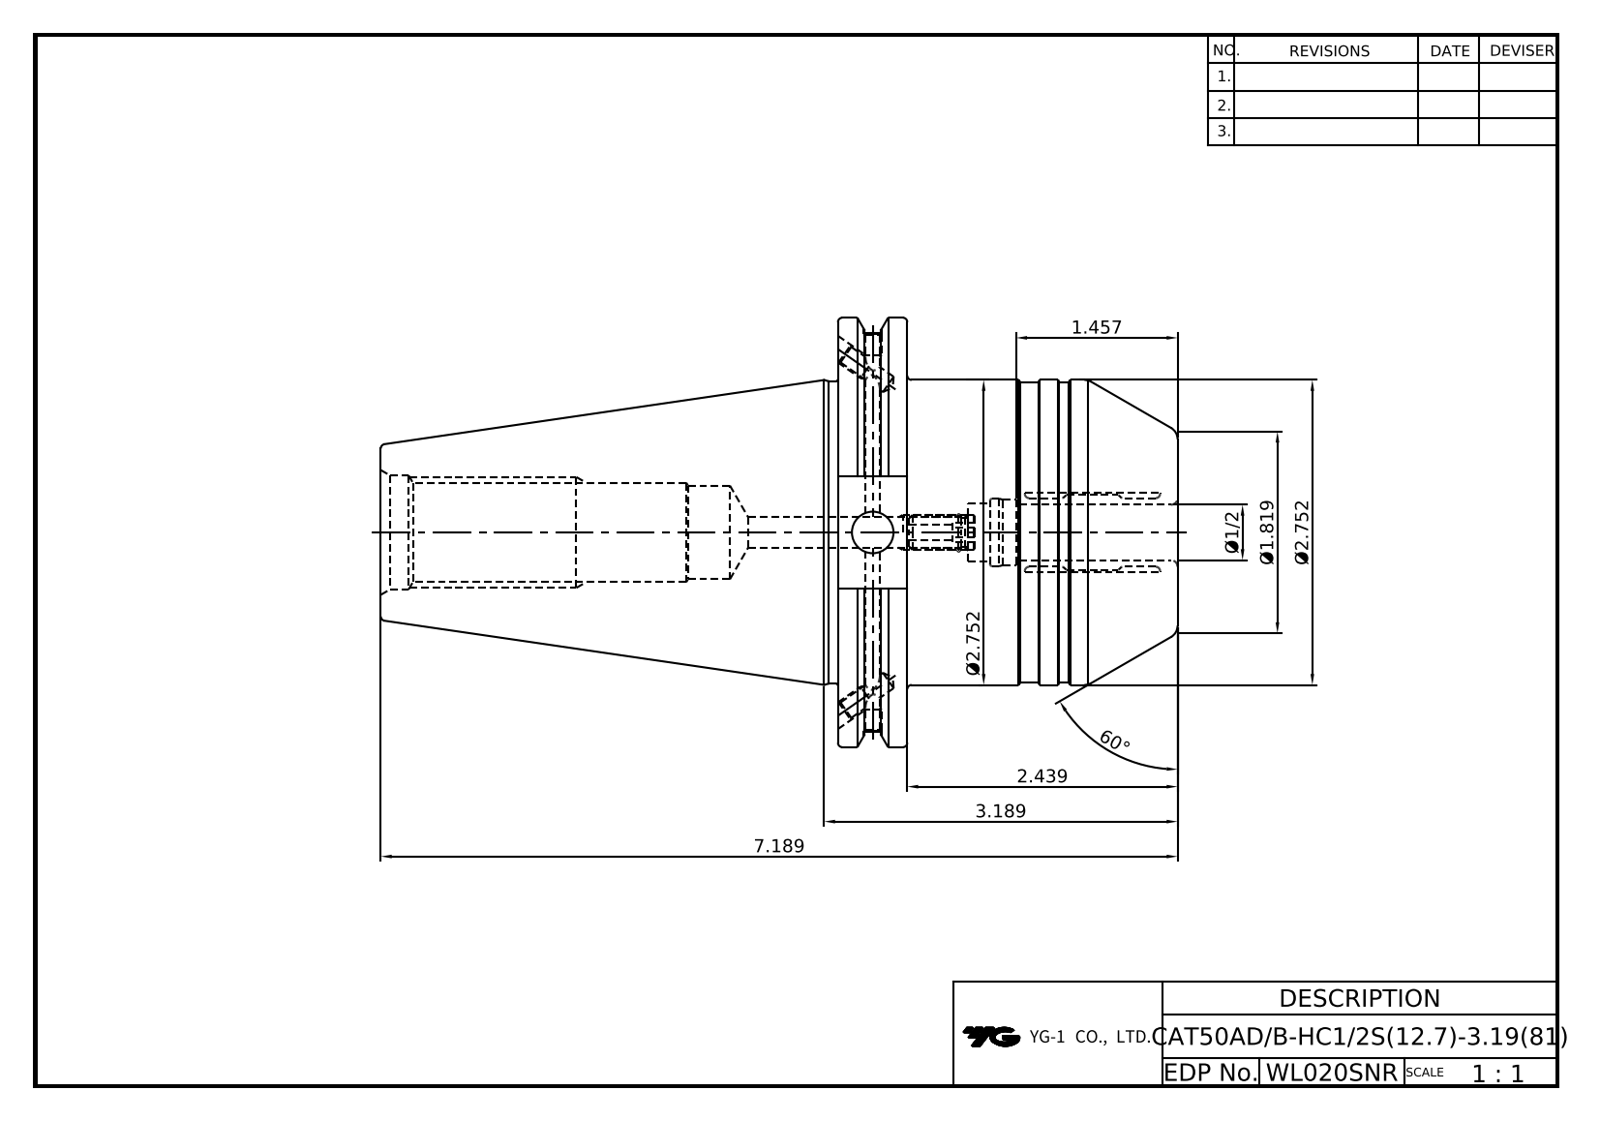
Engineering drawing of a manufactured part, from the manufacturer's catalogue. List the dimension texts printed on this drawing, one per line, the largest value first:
60°
7.189
3.189
Ø2.752
Ø2.752
2.439
Ø1.819
1.457
Ø1/2
